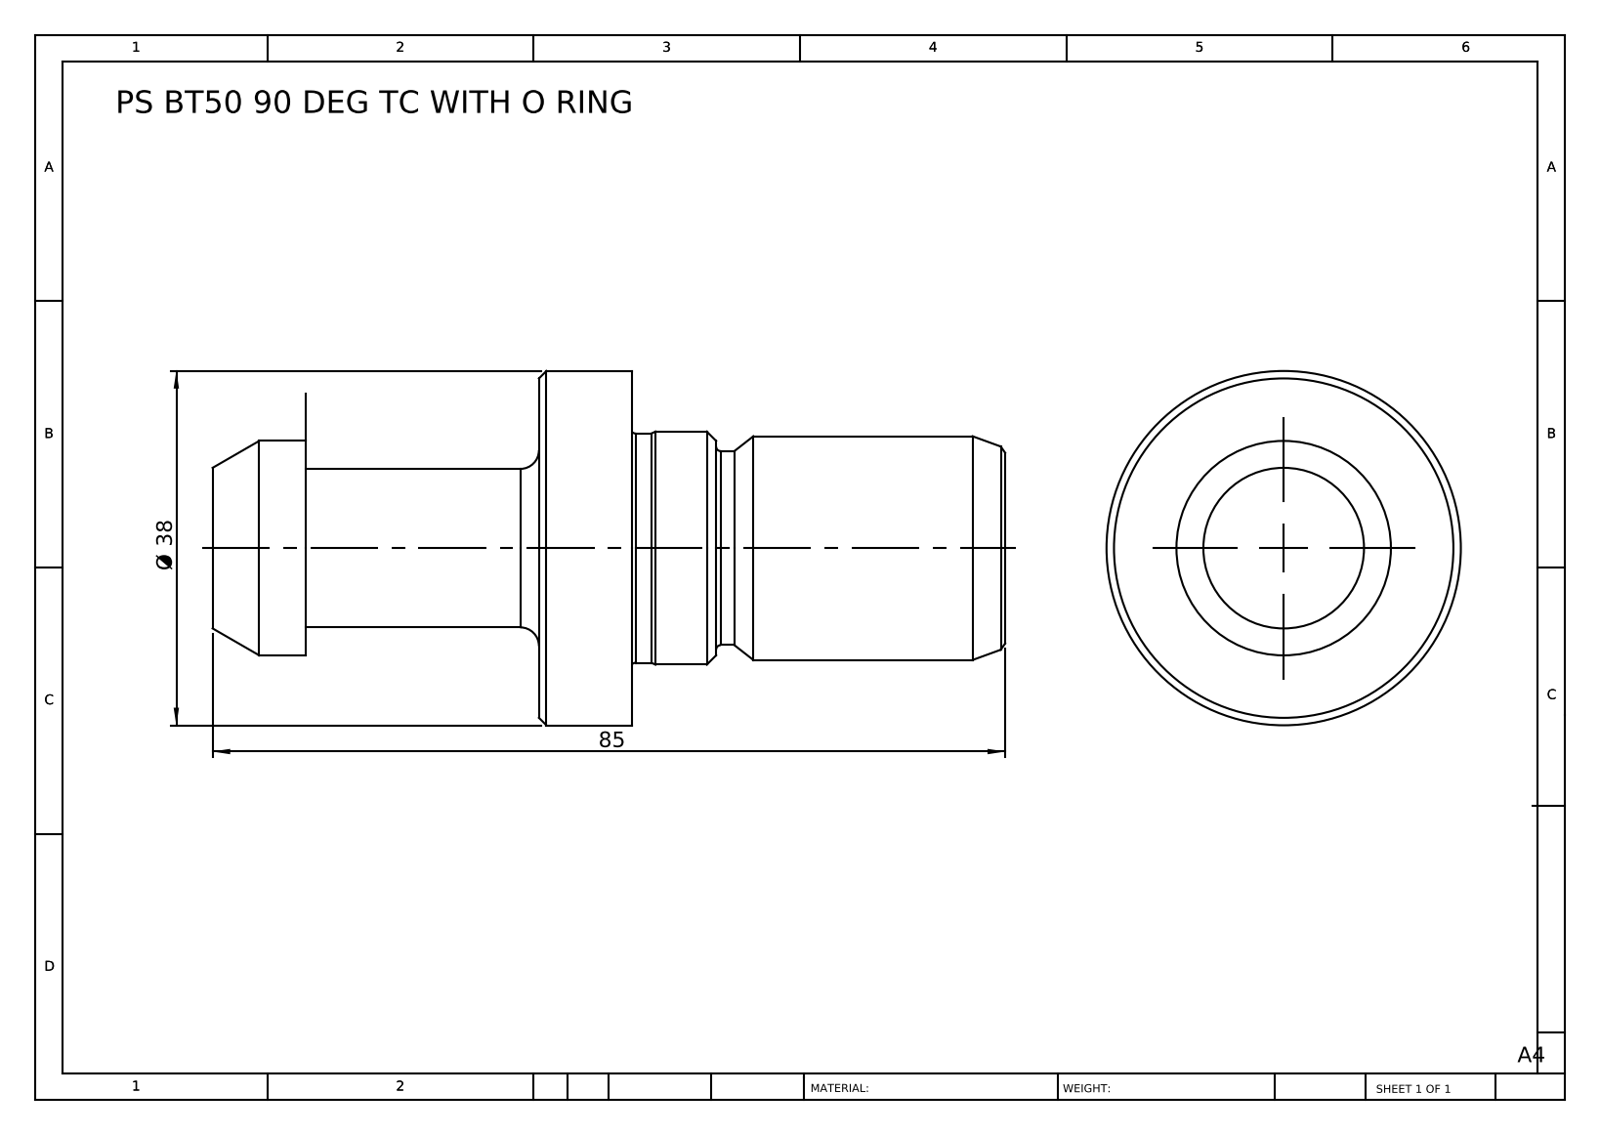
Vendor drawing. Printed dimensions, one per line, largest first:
85
Ø 38
